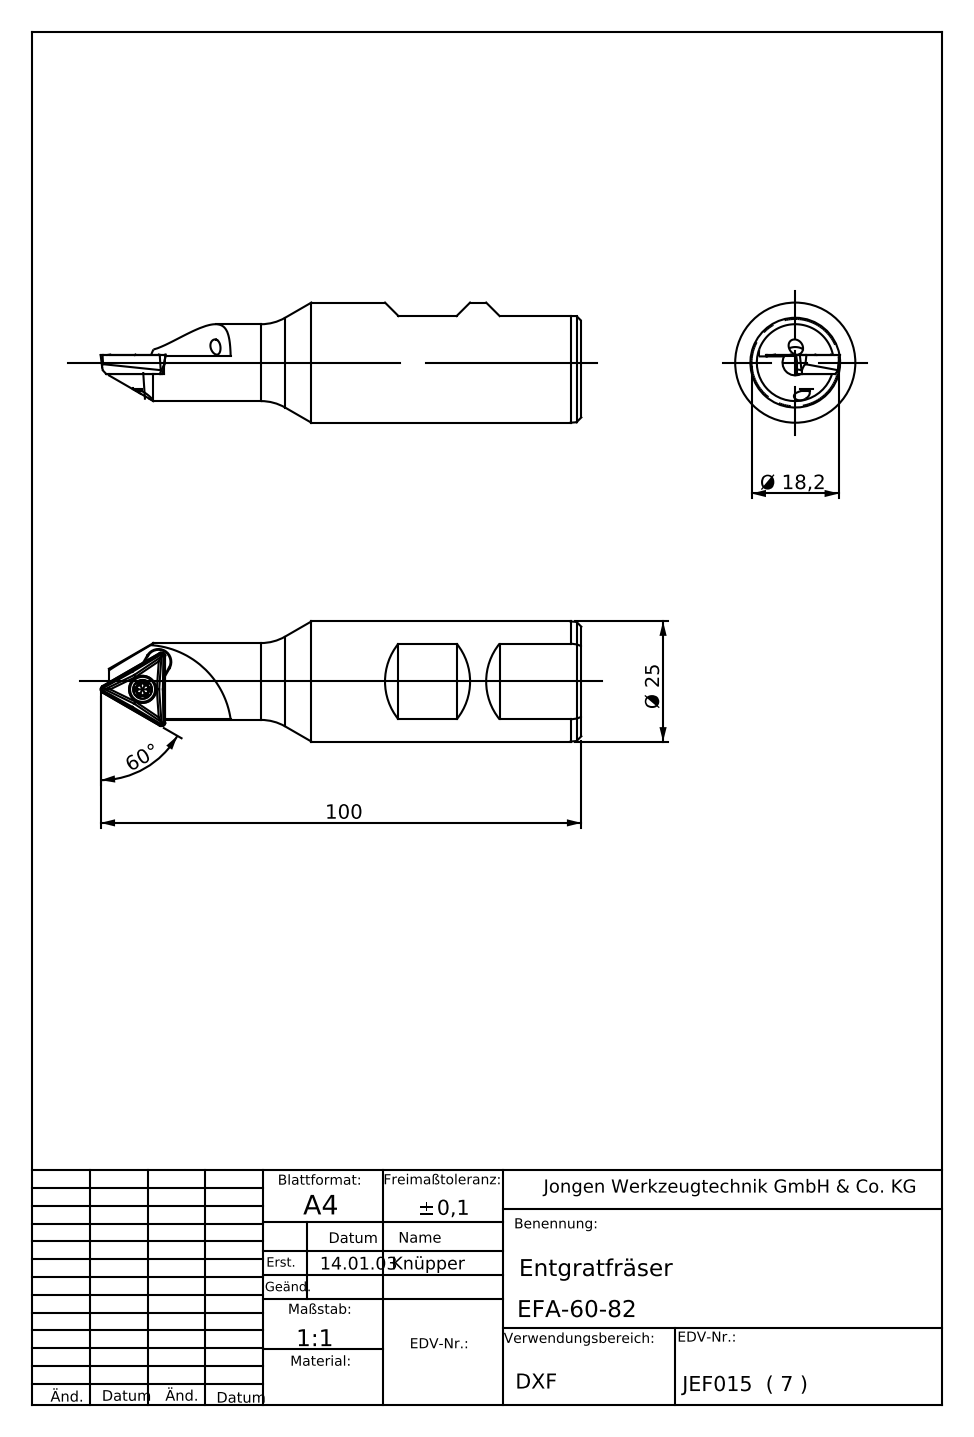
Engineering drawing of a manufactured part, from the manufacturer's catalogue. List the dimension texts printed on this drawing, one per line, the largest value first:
100
60°
Ø 25
Ø 18,2
